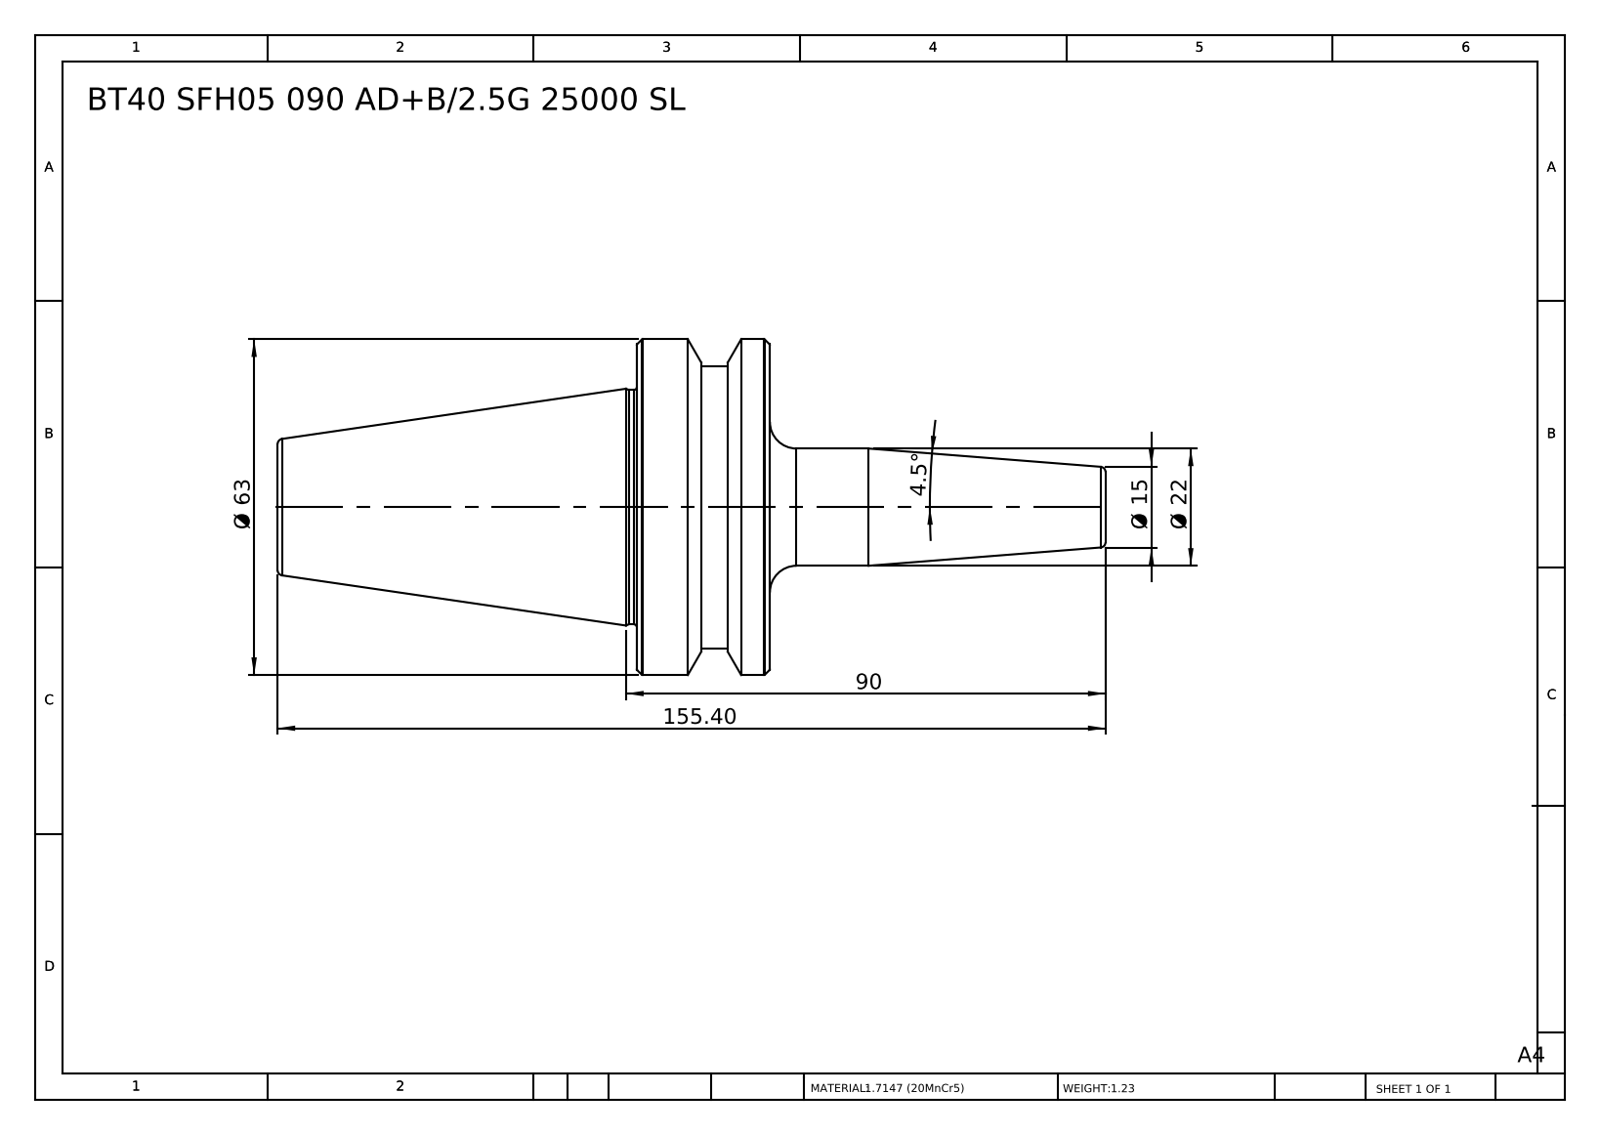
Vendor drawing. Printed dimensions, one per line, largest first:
155.40
90
Ø 63
Ø 22
Ø 15
4.5°
